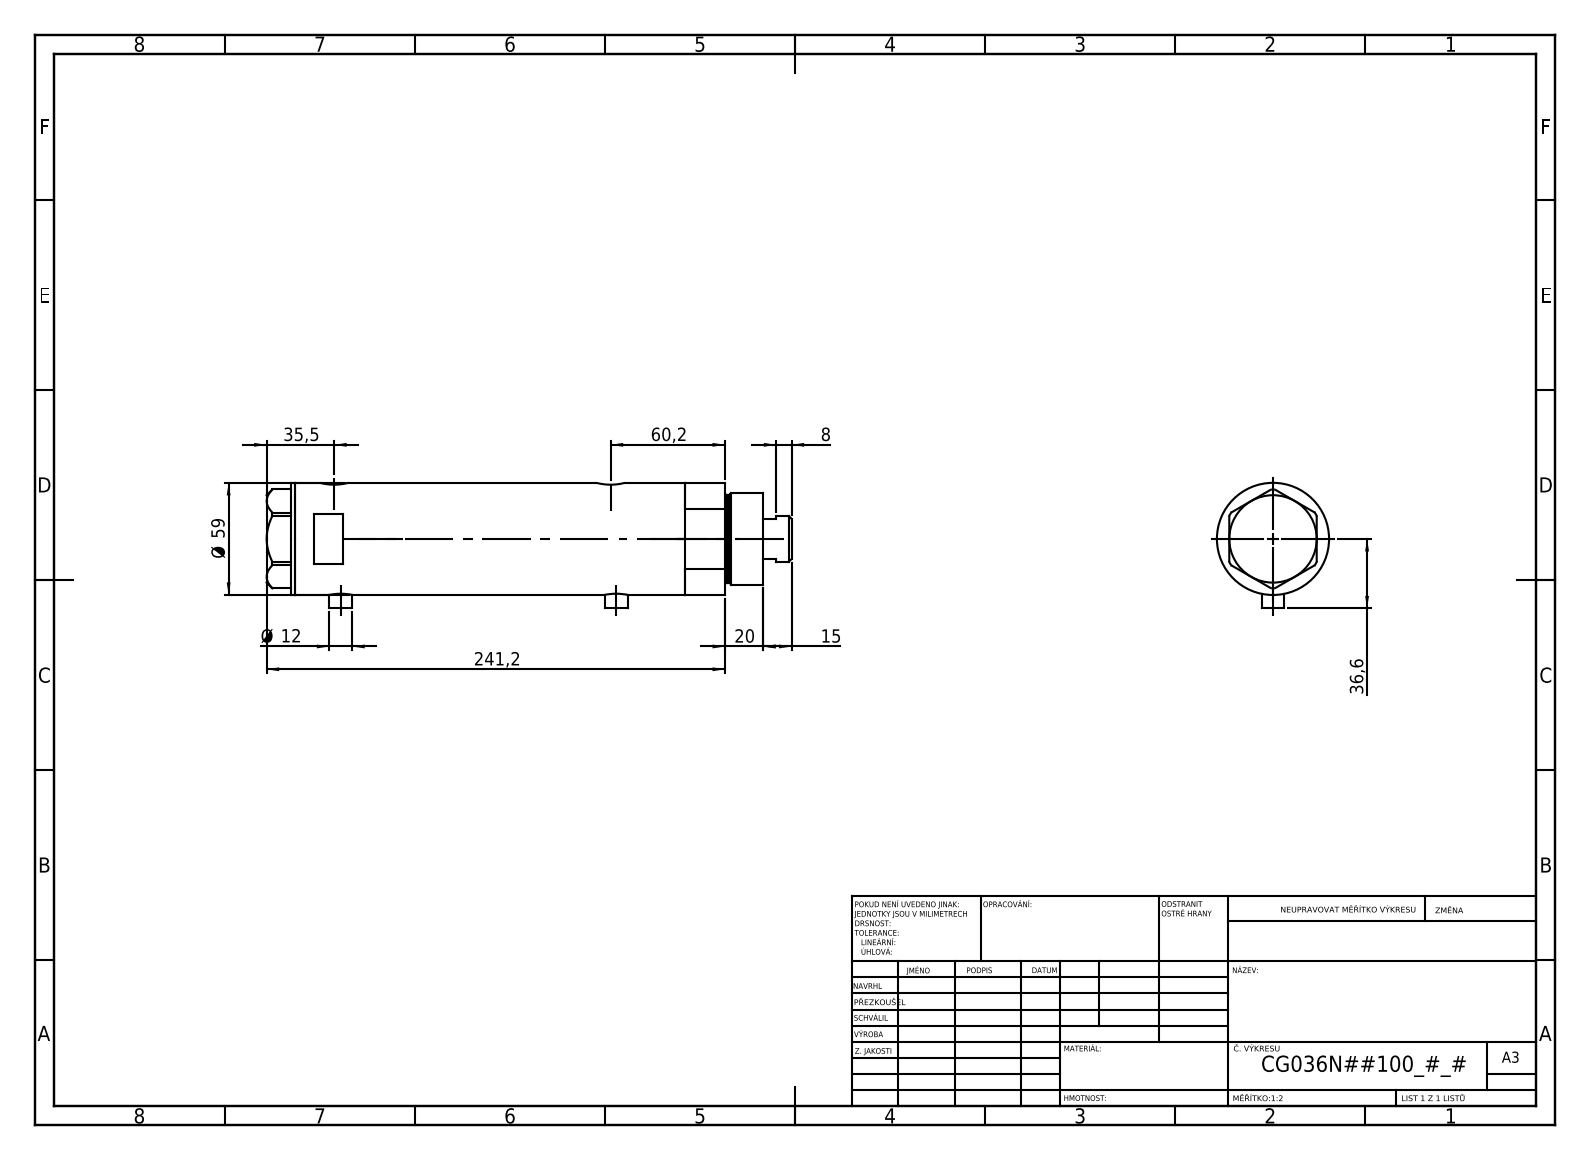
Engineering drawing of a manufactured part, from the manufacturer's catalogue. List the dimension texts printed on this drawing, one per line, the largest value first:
241,2
60,2
Ø 59
36,6
35,5
20
15
Ø 12
8
